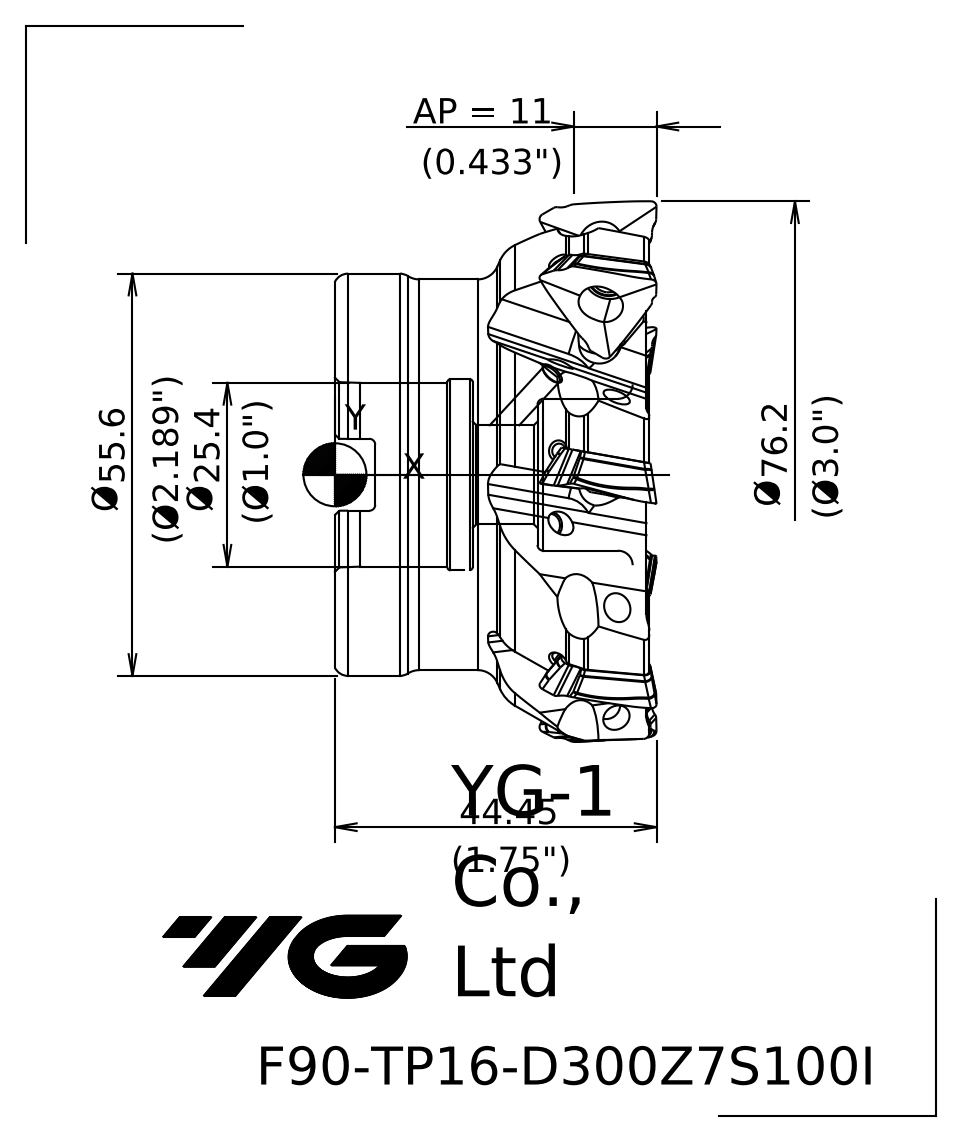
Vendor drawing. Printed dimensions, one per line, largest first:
76.2 Ø
44.45
25.4 Ø
AP = 11
